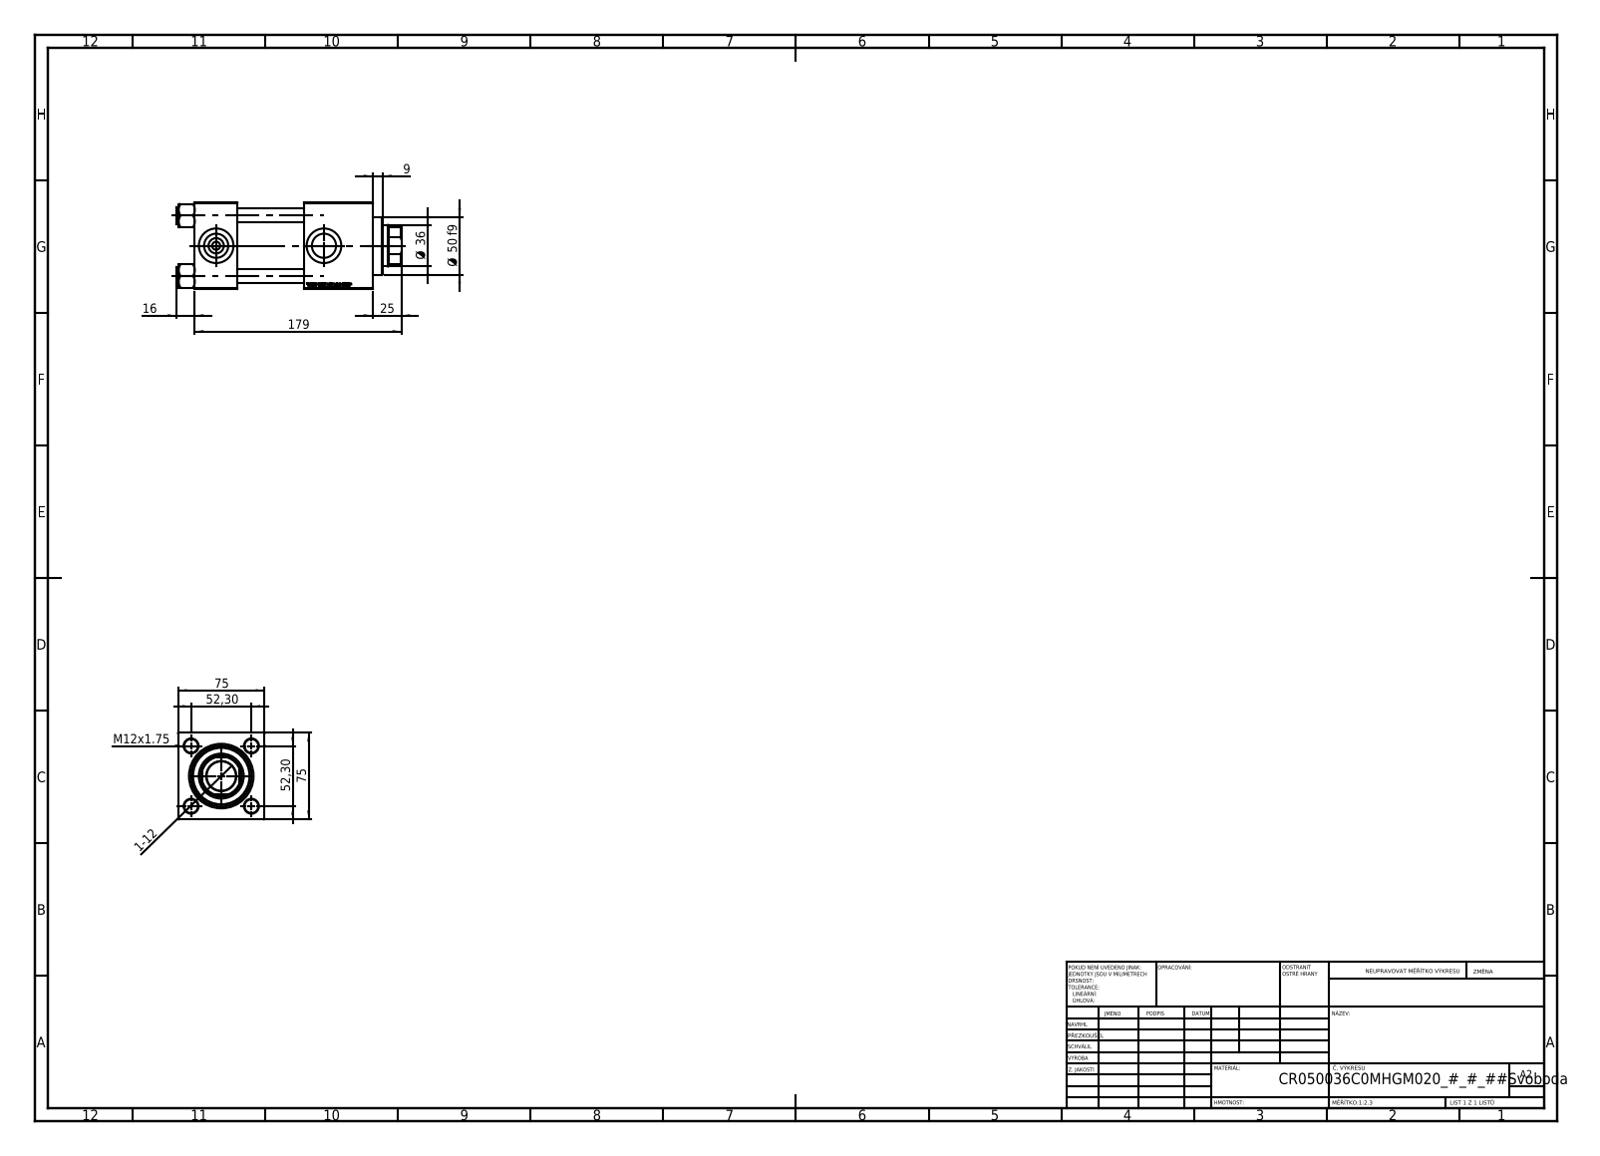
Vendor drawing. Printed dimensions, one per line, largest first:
179
75
75
52,30
52,30
Ø 50 f9
Ø 36
25
16
M12x1.75
9
1-12
